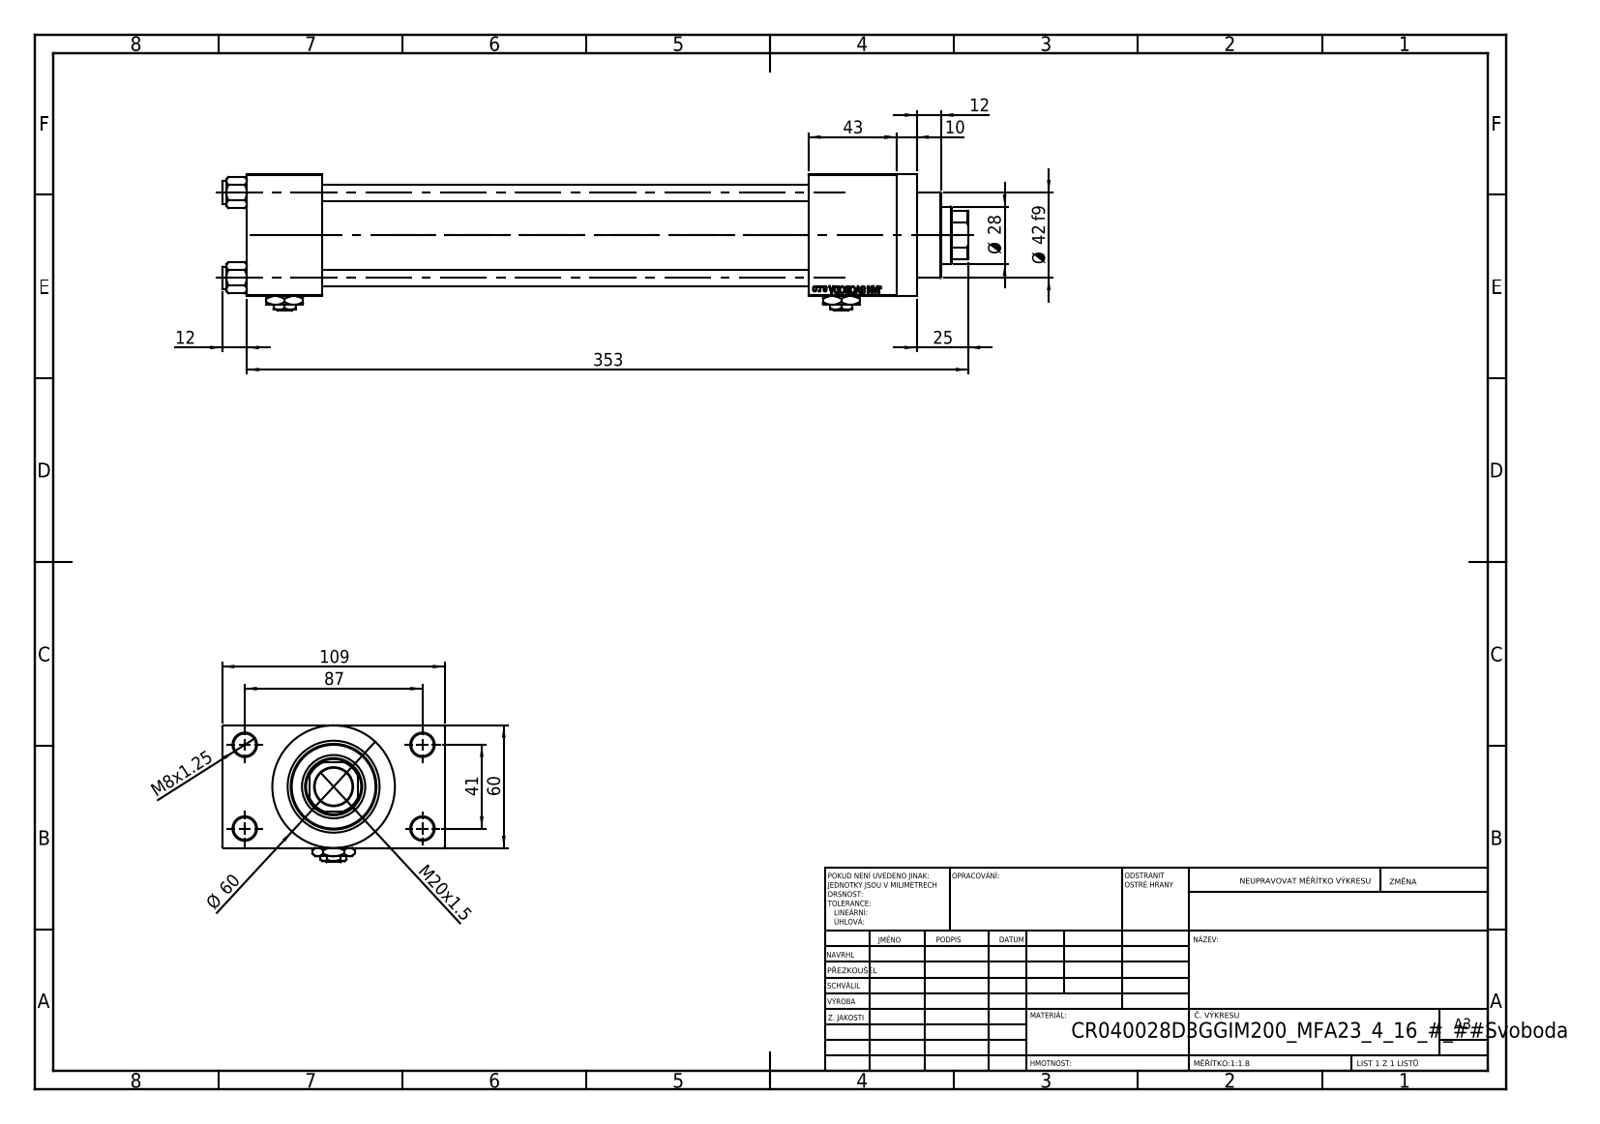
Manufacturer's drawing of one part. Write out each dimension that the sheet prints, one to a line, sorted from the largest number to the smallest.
353
109
87
Ø 60
60
43
Ø 42 f9
41
Ø 28
25
M20x1.5
12
12
10
M8x1.25
